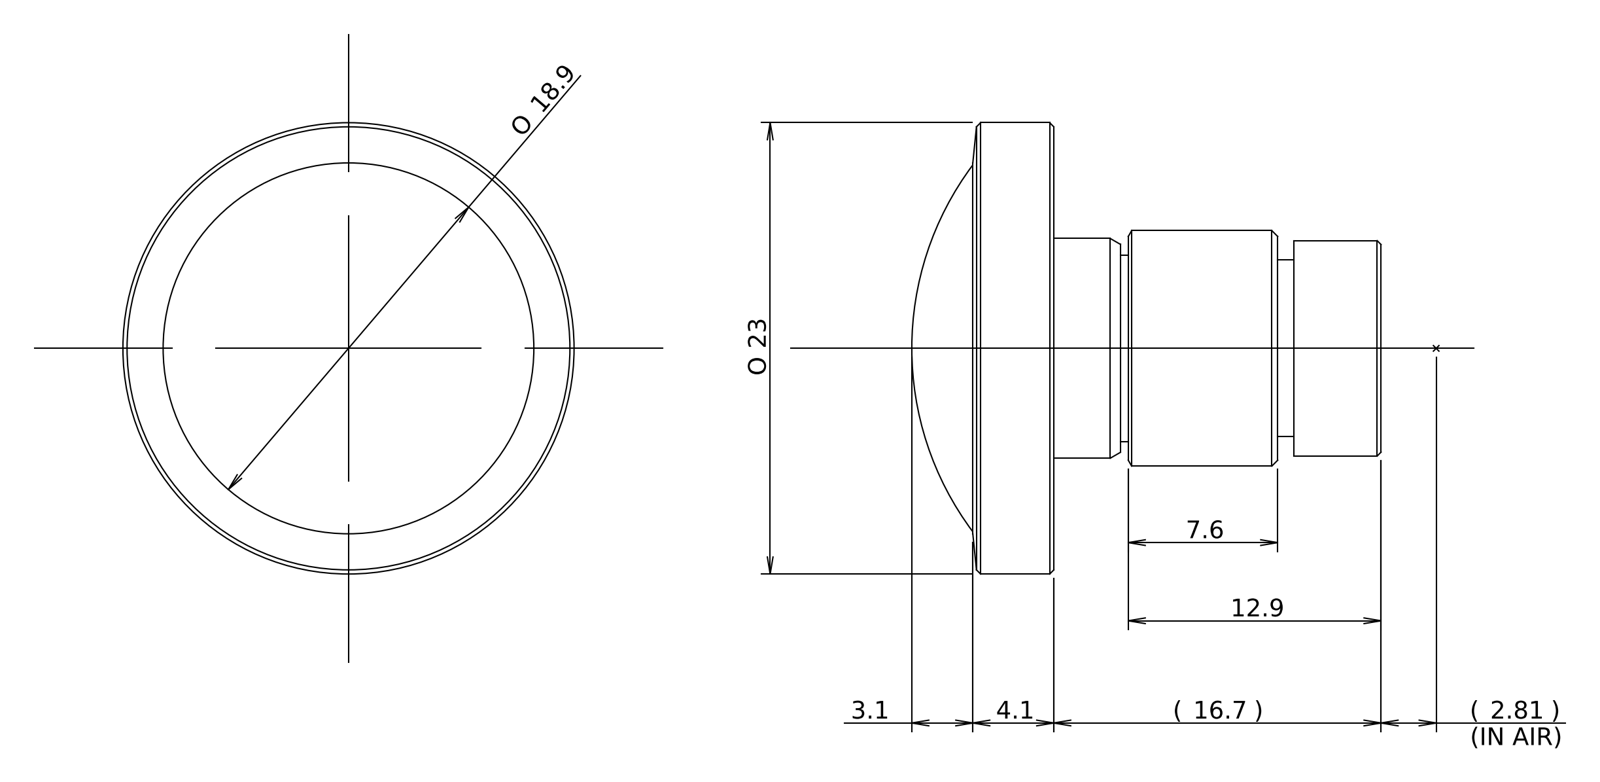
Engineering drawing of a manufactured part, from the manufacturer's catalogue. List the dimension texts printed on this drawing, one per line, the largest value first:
23 O
O 18.9
16.7 ( )
12.9
7.6
4.1
3.1
2.81 ( ) (IN AIR)
